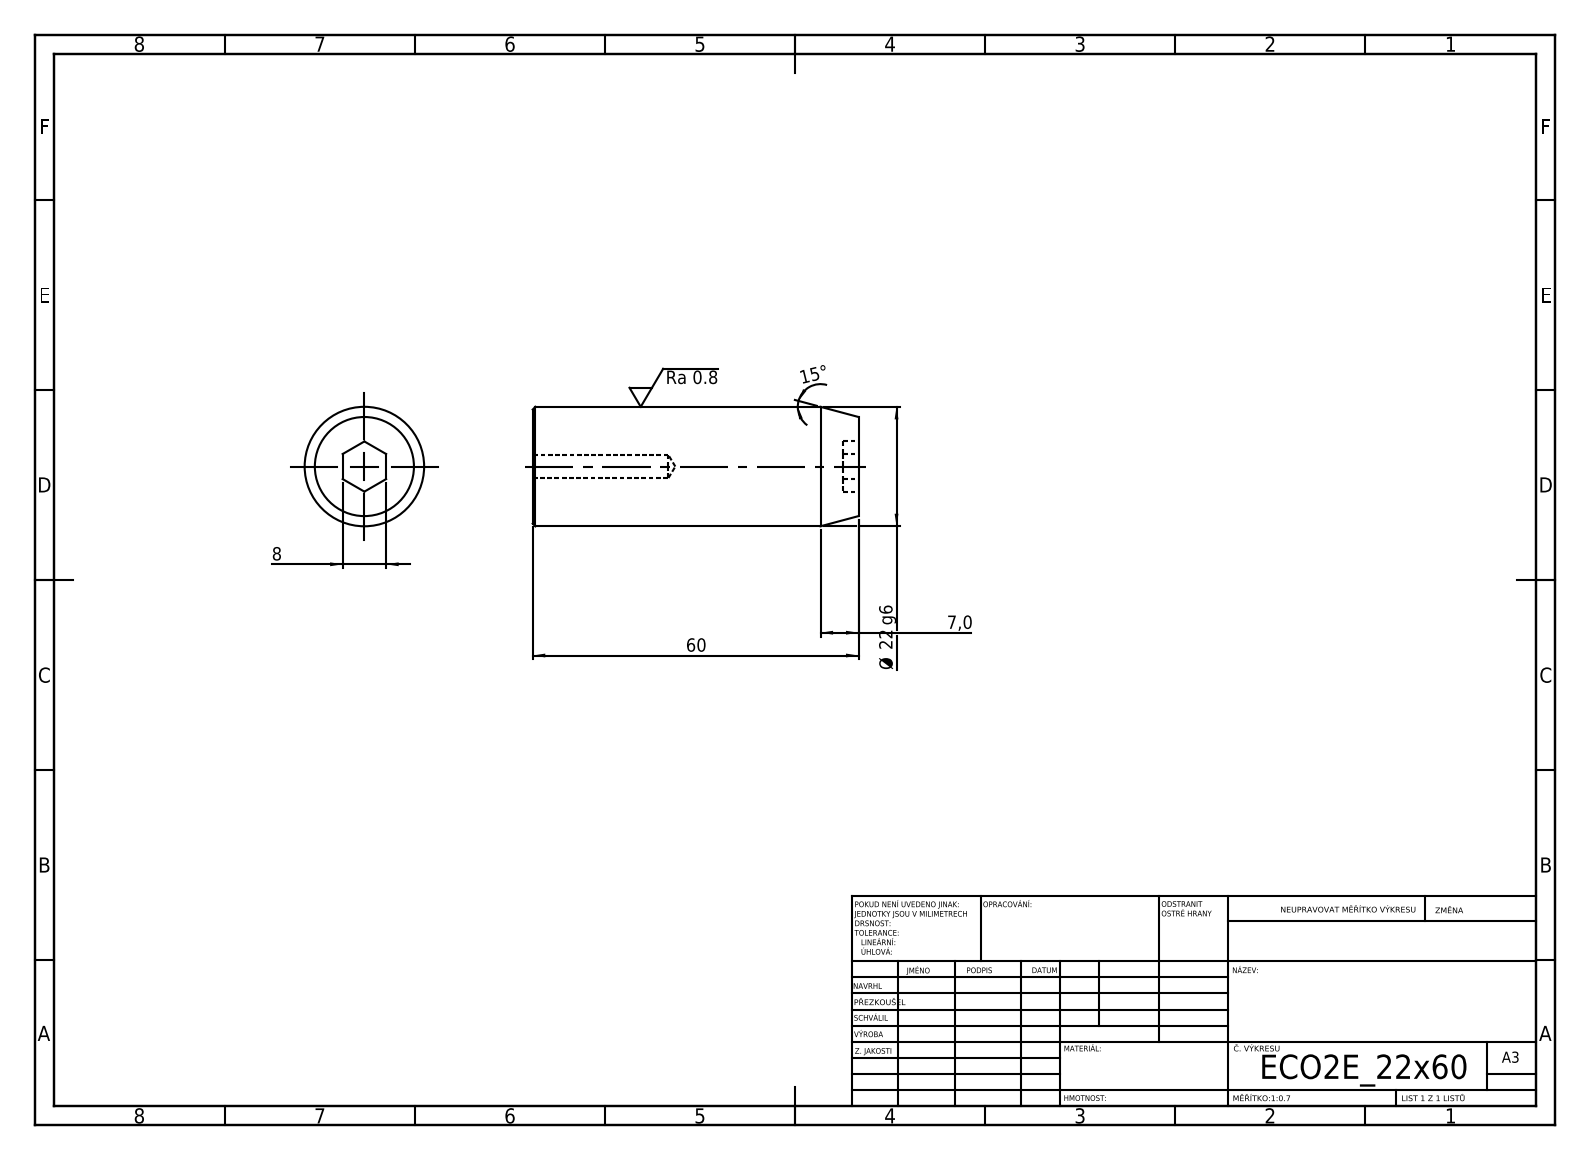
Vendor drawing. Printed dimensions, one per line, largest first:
60
Ø 22 g6
15°
8
7,0
